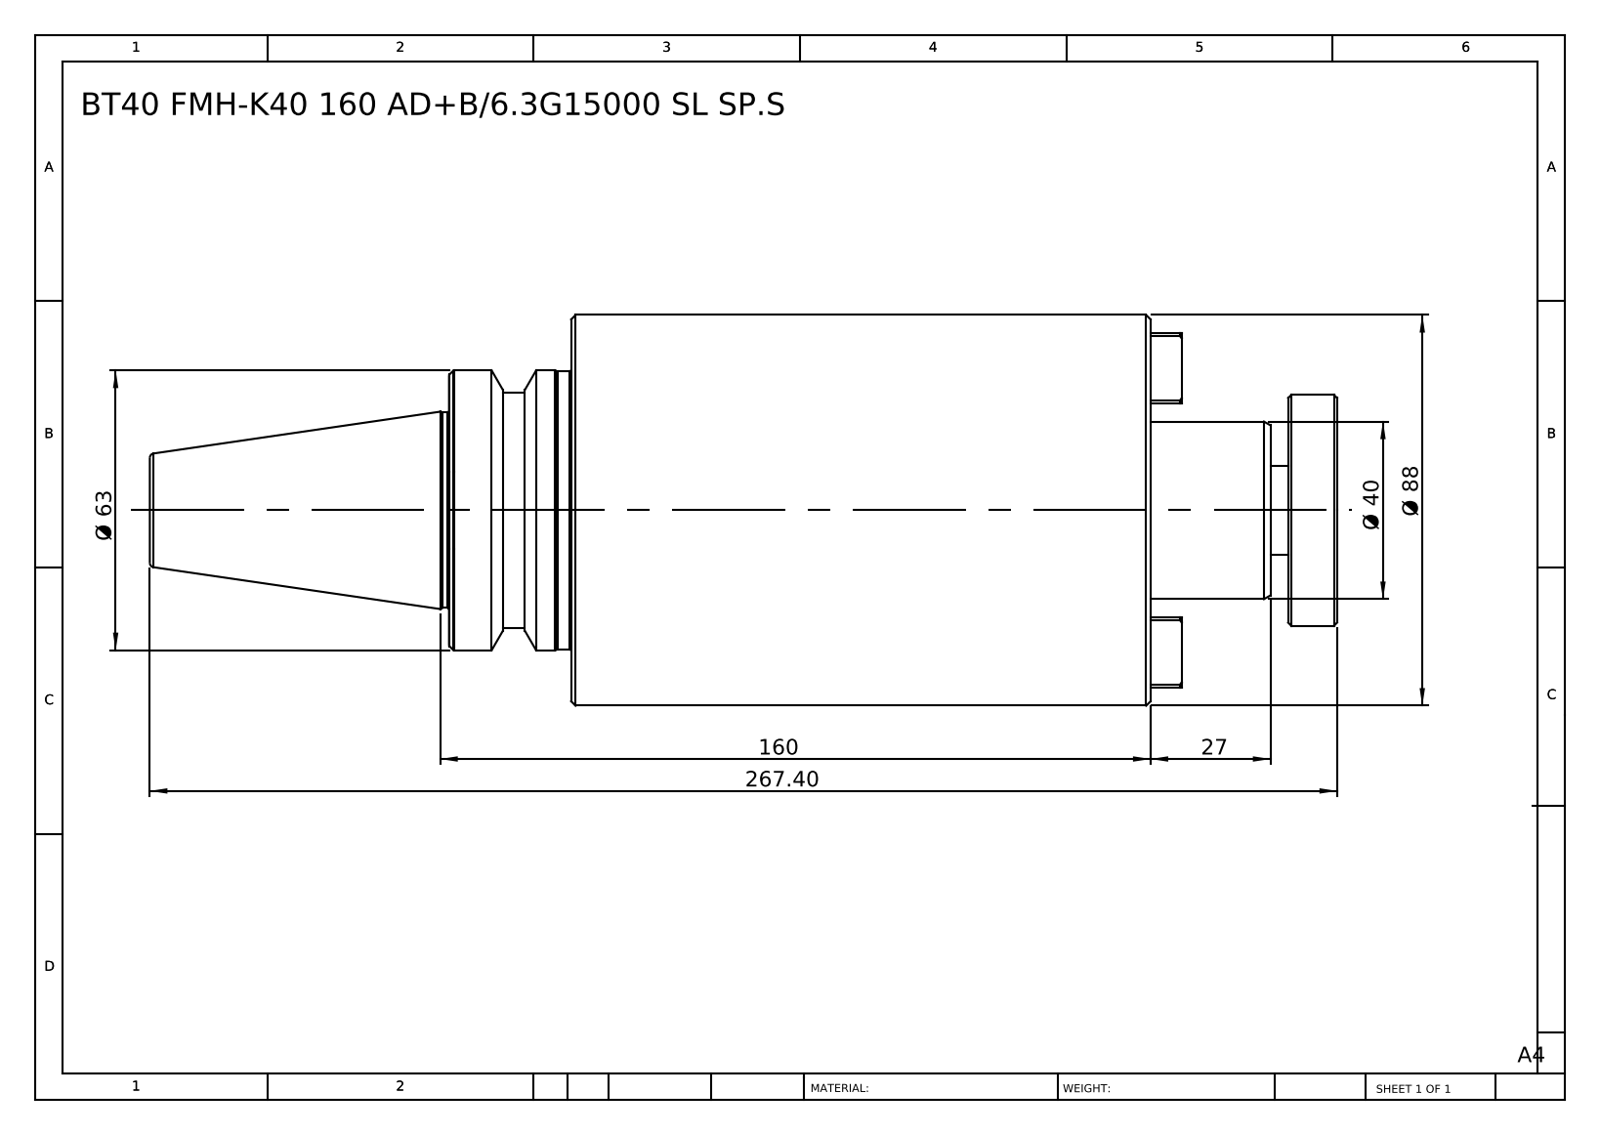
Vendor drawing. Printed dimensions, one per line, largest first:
267.40
160
Ø 88
Ø 63
Ø 40
27
